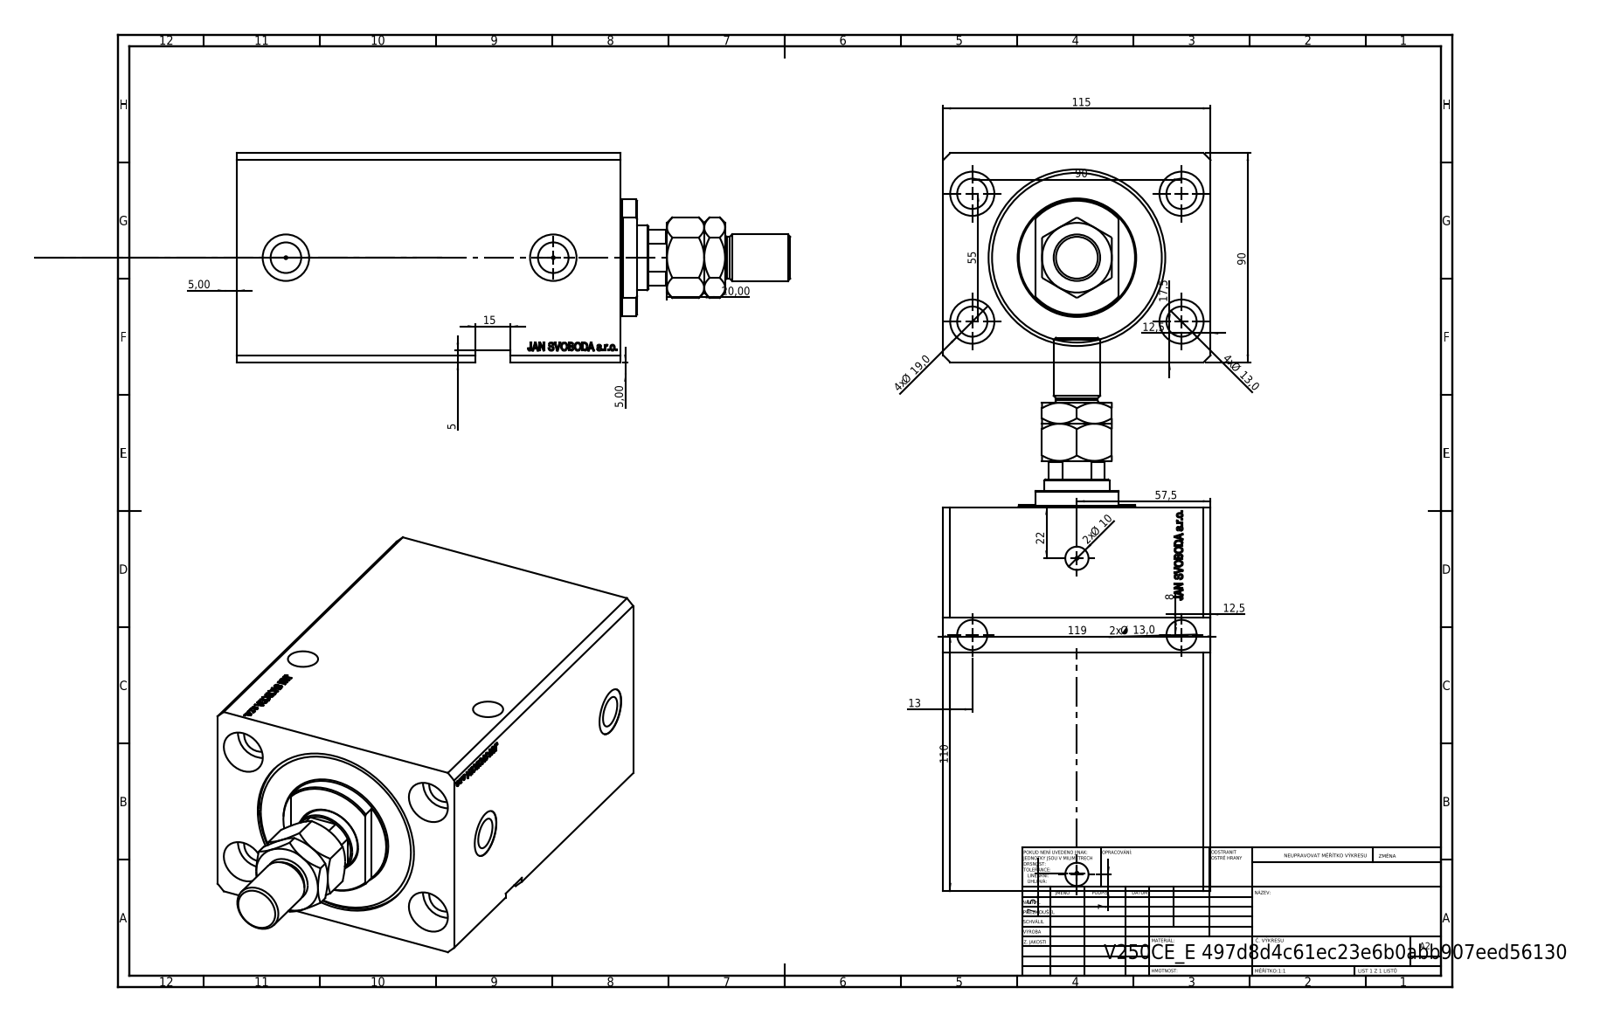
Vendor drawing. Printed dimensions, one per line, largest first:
119
115
110
90
90
57,5
55
22
20,00
4x Ø 19,0
17,5
15
4x Ø 13,0
2x Ø 13,0
13
12,5
12,5
2x Ø 10
8
7,5
7
5,00
5,00
5
